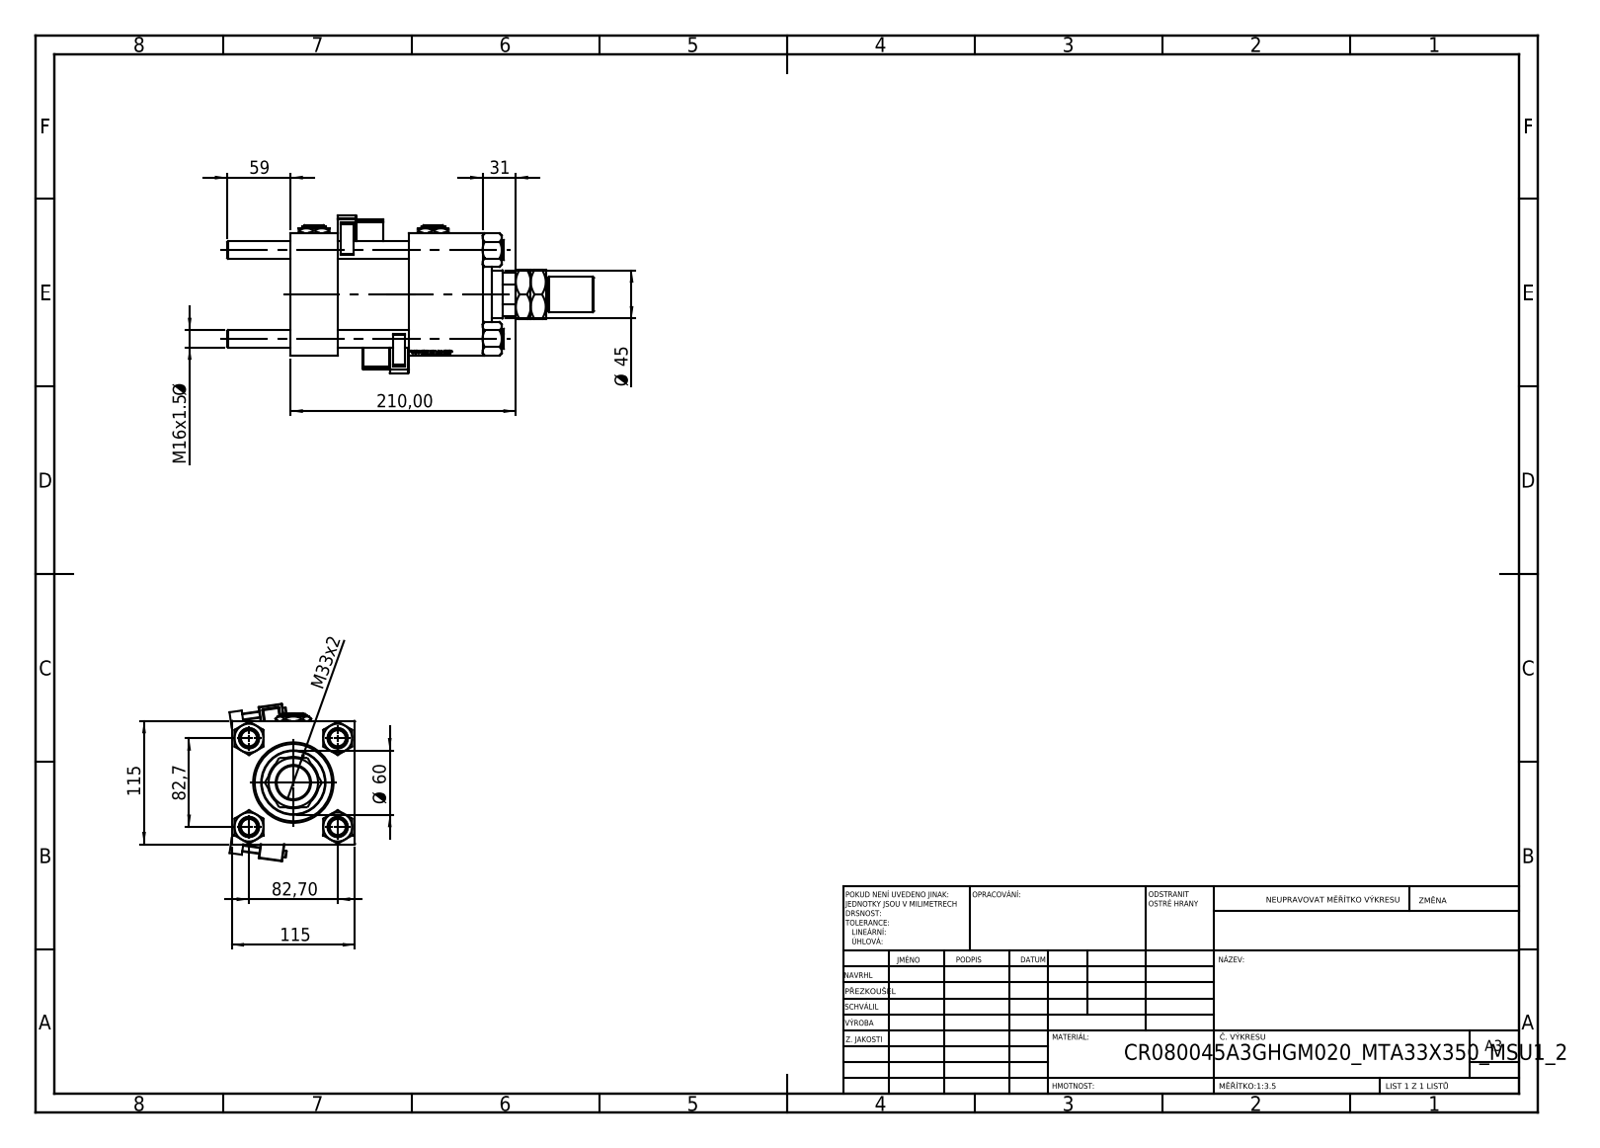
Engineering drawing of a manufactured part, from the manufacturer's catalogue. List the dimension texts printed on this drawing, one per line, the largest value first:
210,00
115
115
82,7
82,70
Ø 60
59
Ø 45
M33x2
31
M16x1.5 Ø
